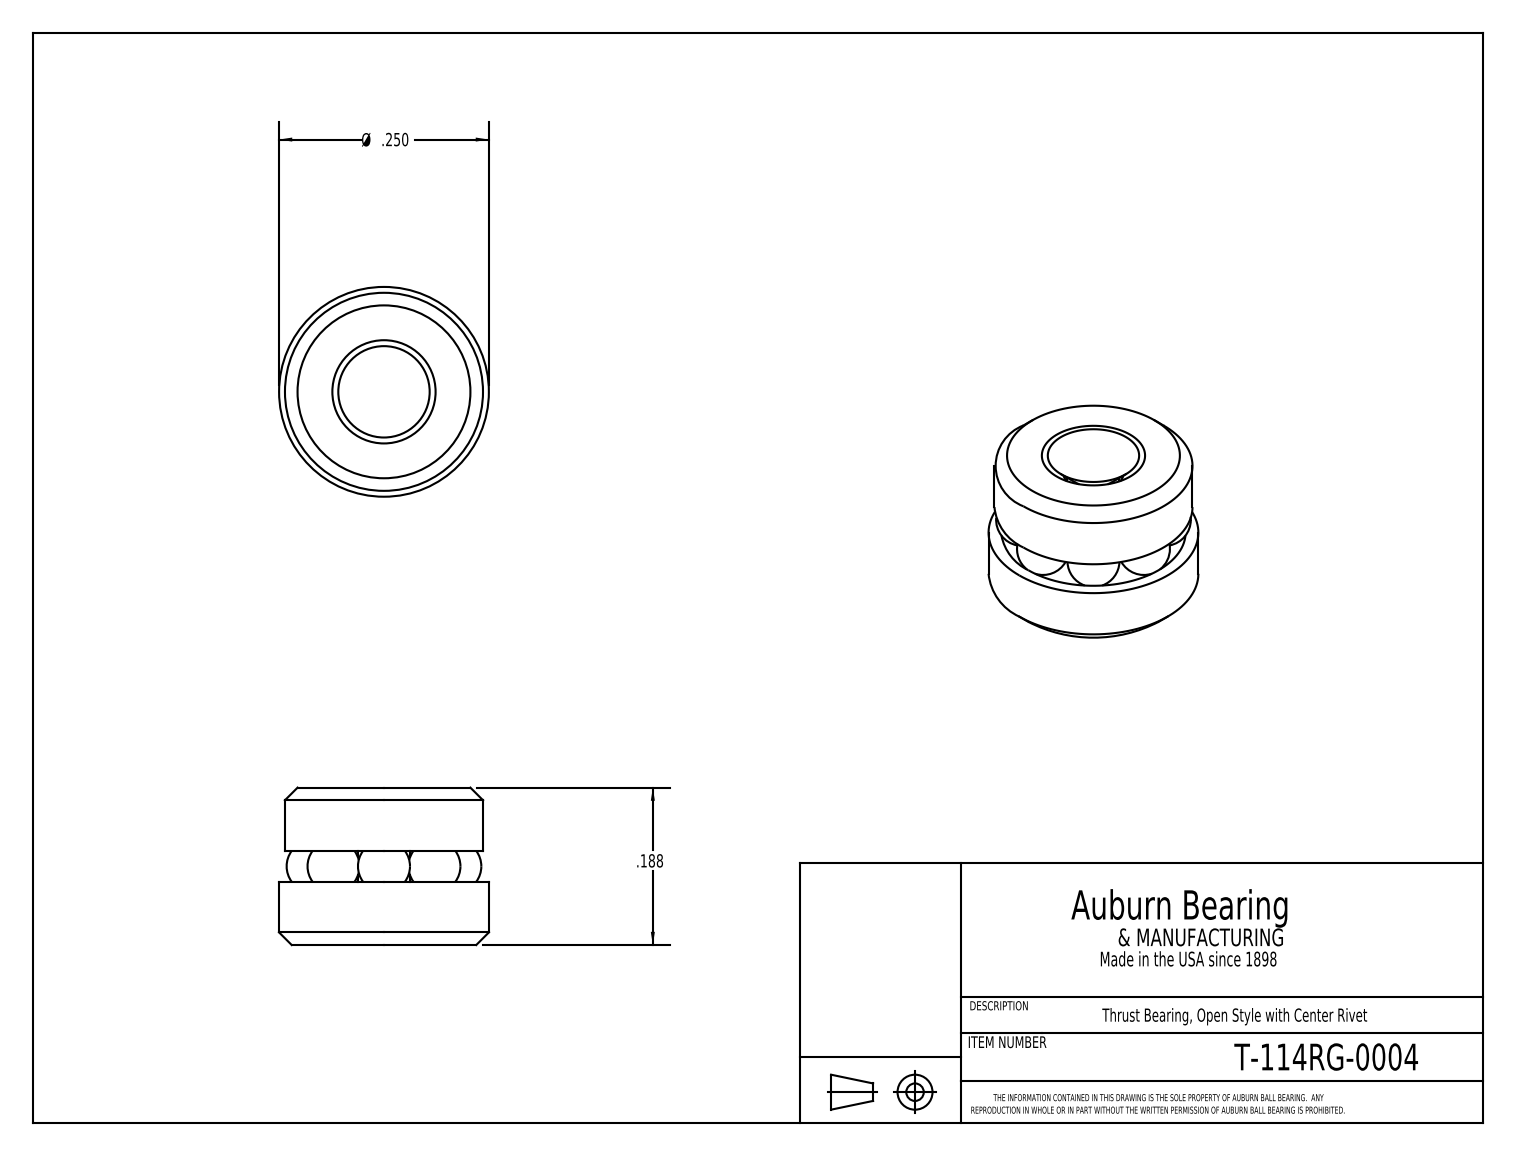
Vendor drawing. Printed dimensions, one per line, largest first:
Ø .250
.188
